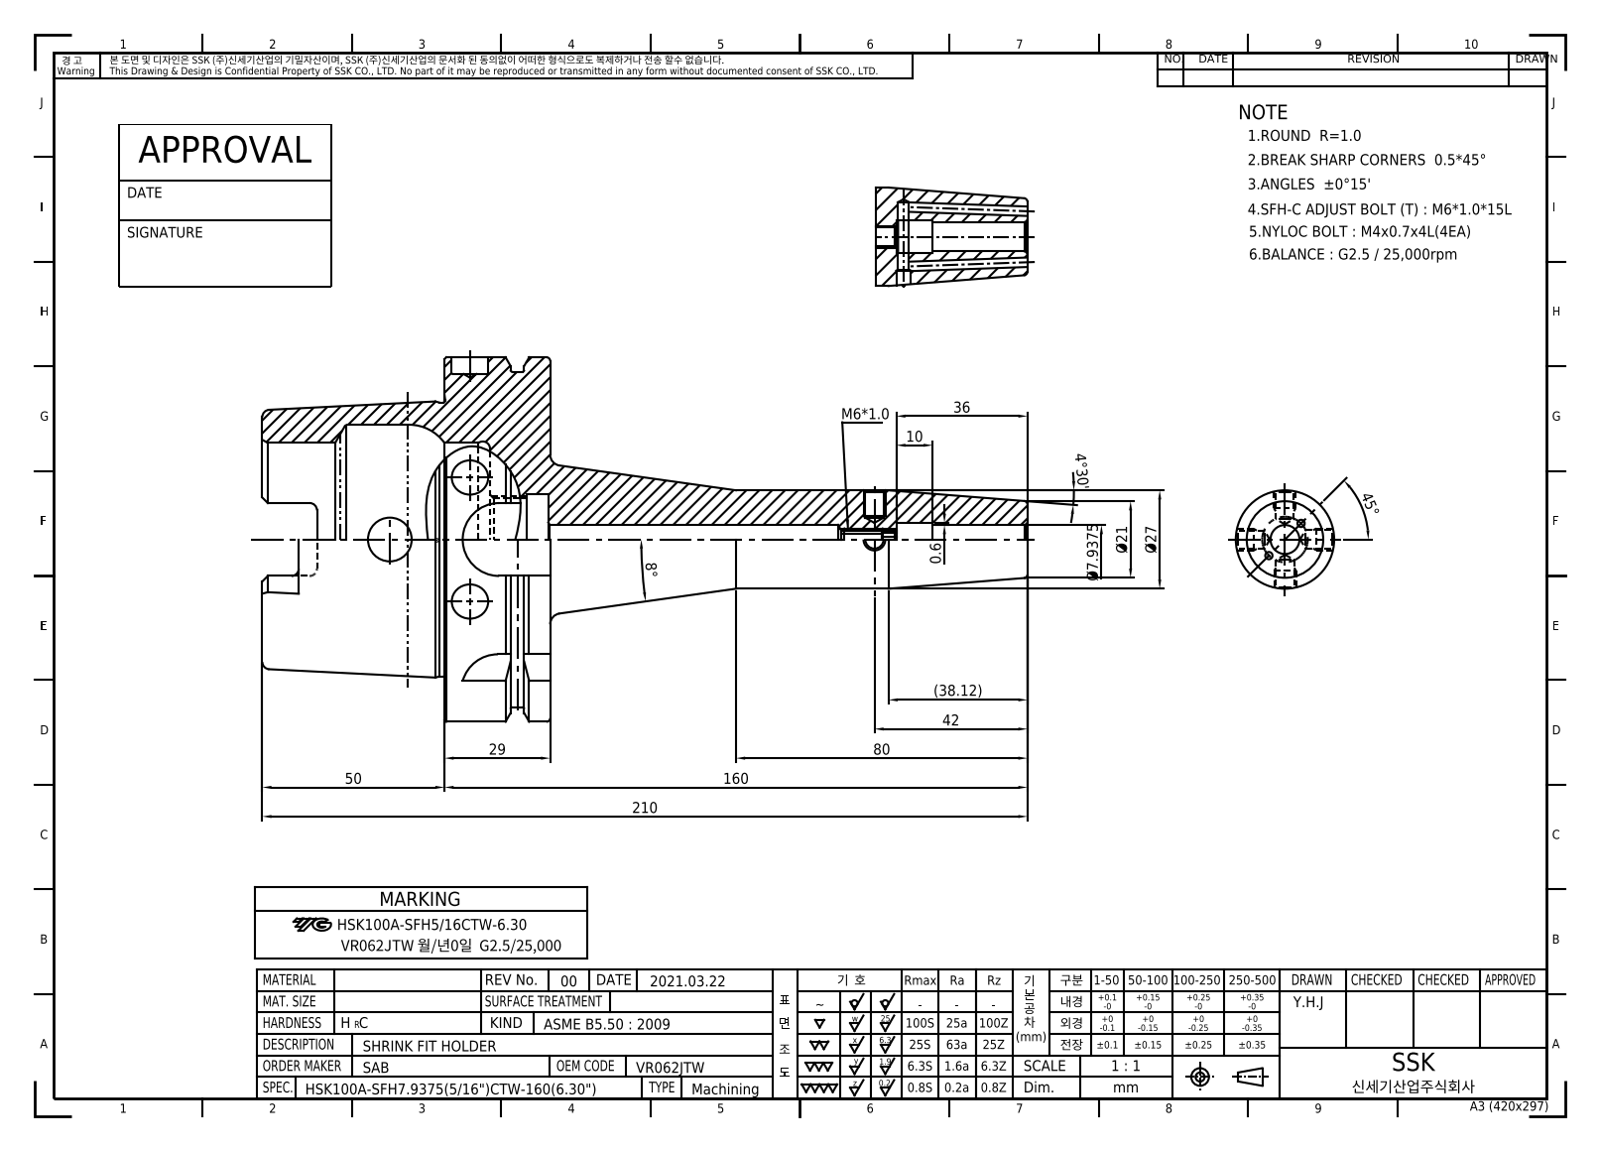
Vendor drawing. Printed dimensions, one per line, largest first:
210
160
80
50
45°
42
(38.12)
36
29
Ø27
Ø21
10
8°
Ø7.9375
4°30'
0.6
